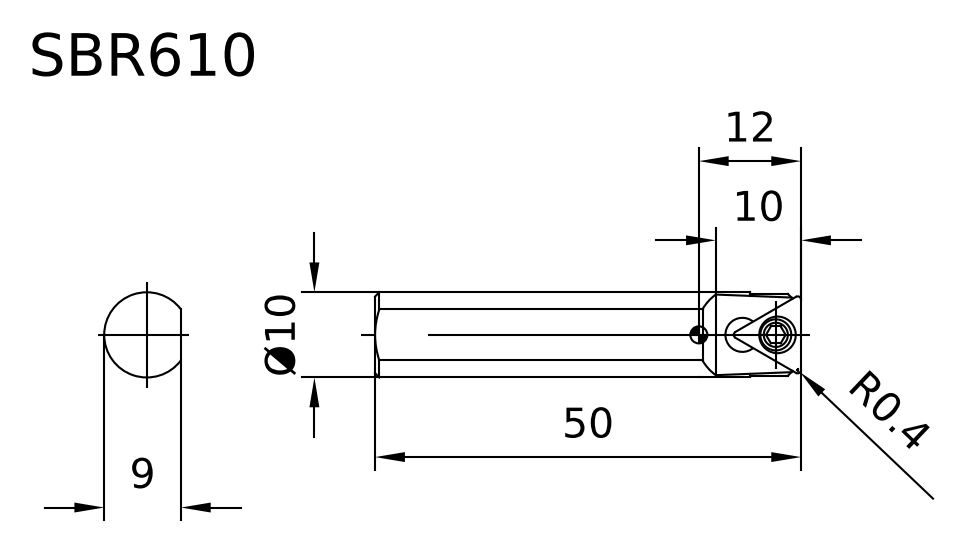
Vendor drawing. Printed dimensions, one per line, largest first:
50
12
Ø10
10
9
R0.4
